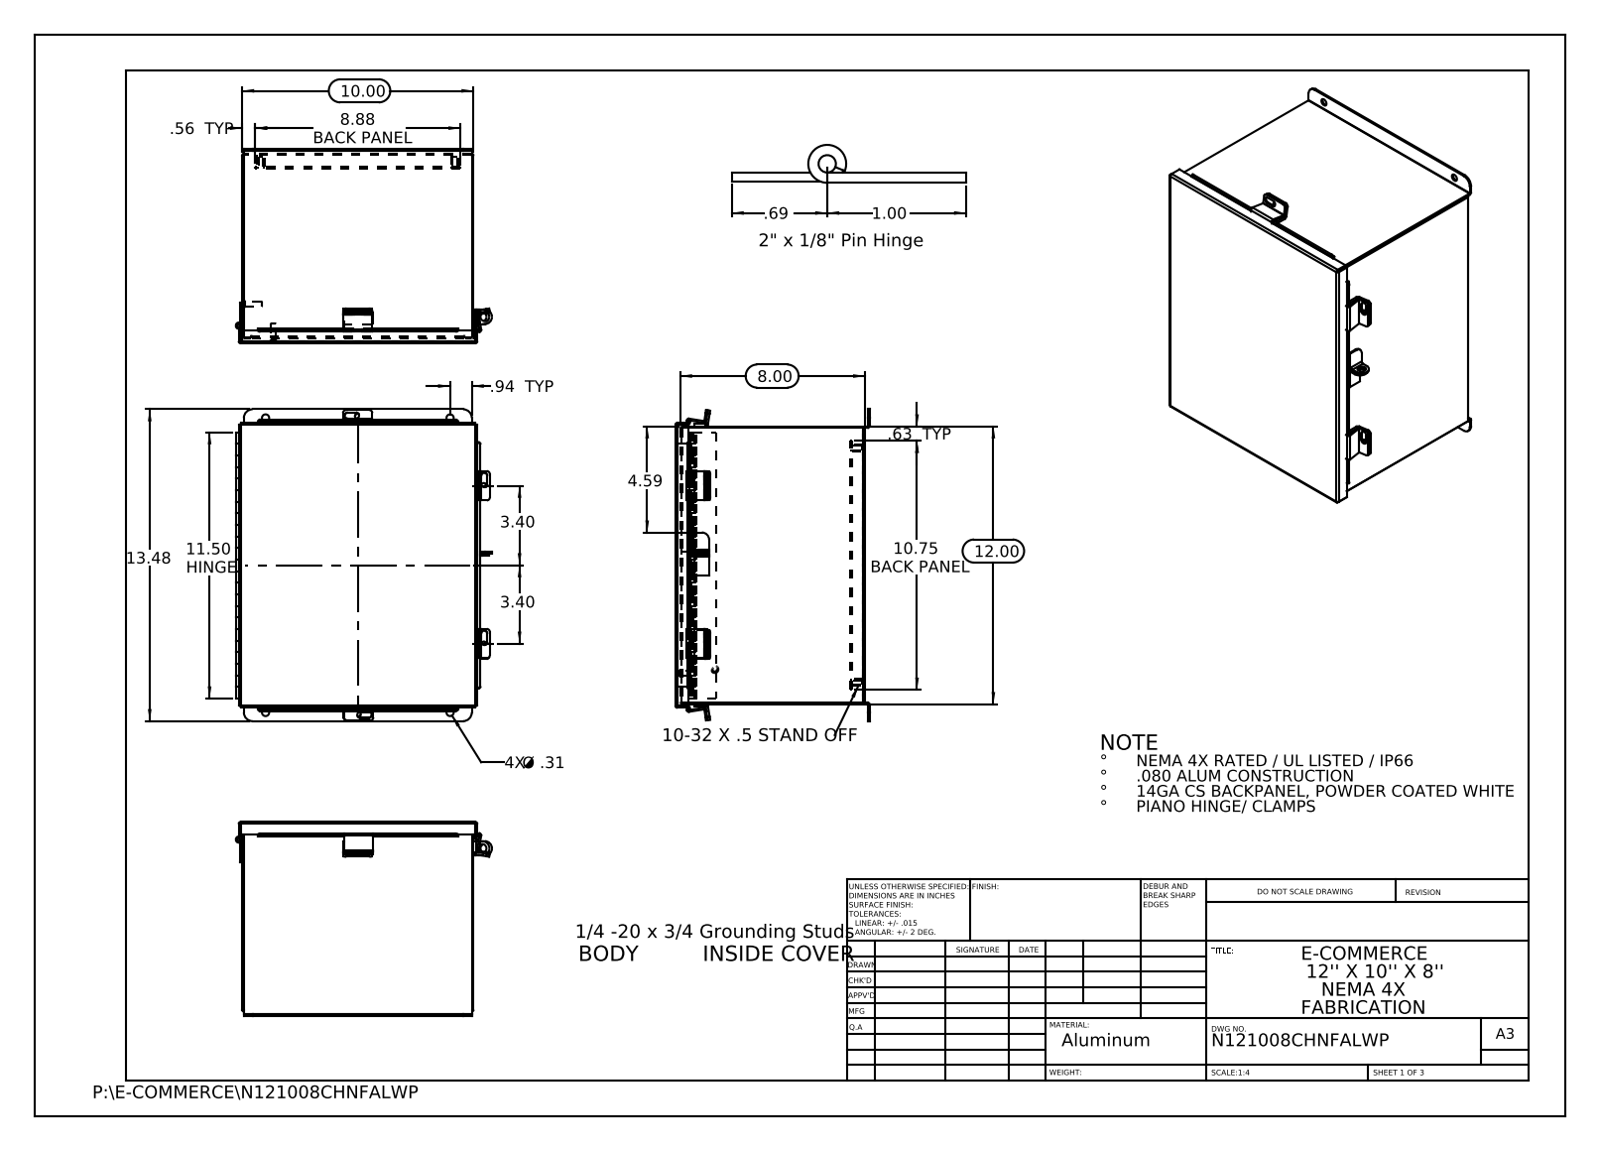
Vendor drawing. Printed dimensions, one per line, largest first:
13.48
12.00
11.50 HINGE
10.75 BACK PANEL
10.00
8.88 BACK PANEL
8.00
4.59
3.40
3.40
1.00
.94 TYP
.69
.63 TYP
.56 TYP
4X Ø .31
